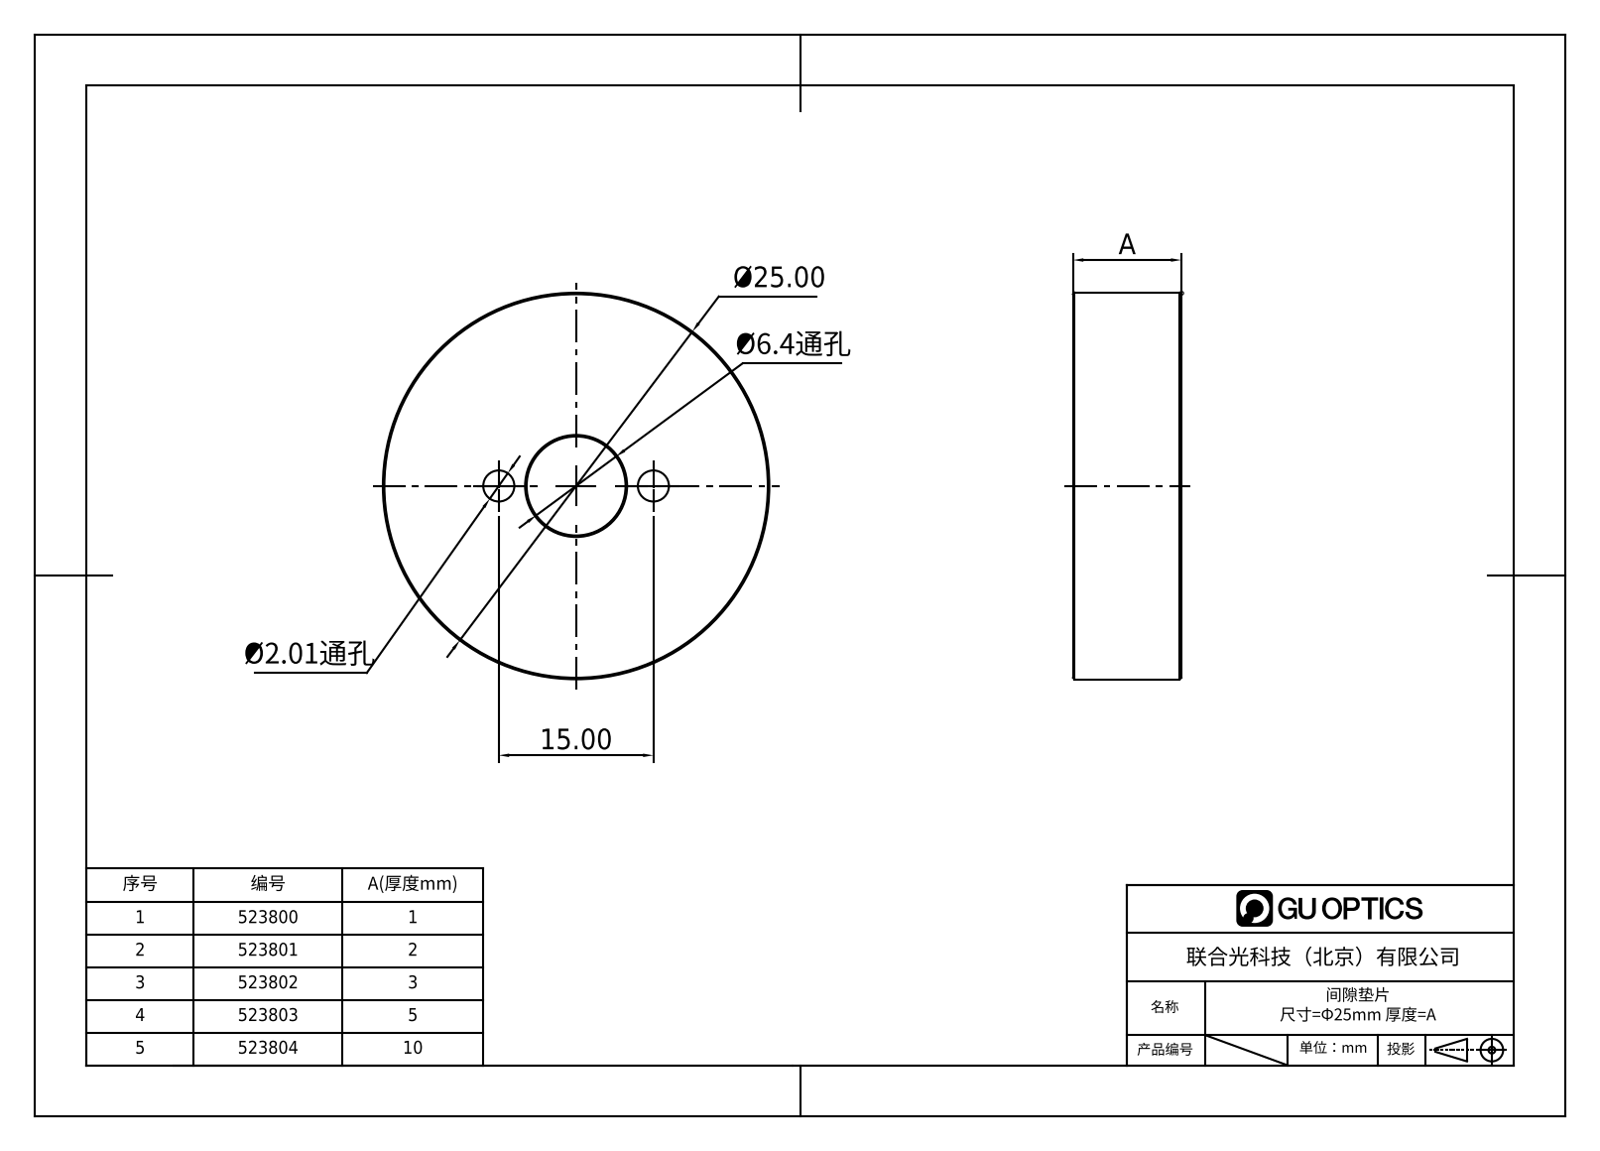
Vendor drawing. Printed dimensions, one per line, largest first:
Ø25.00
15.00
Ø6.4通孔
Ø2.01通孔
A
